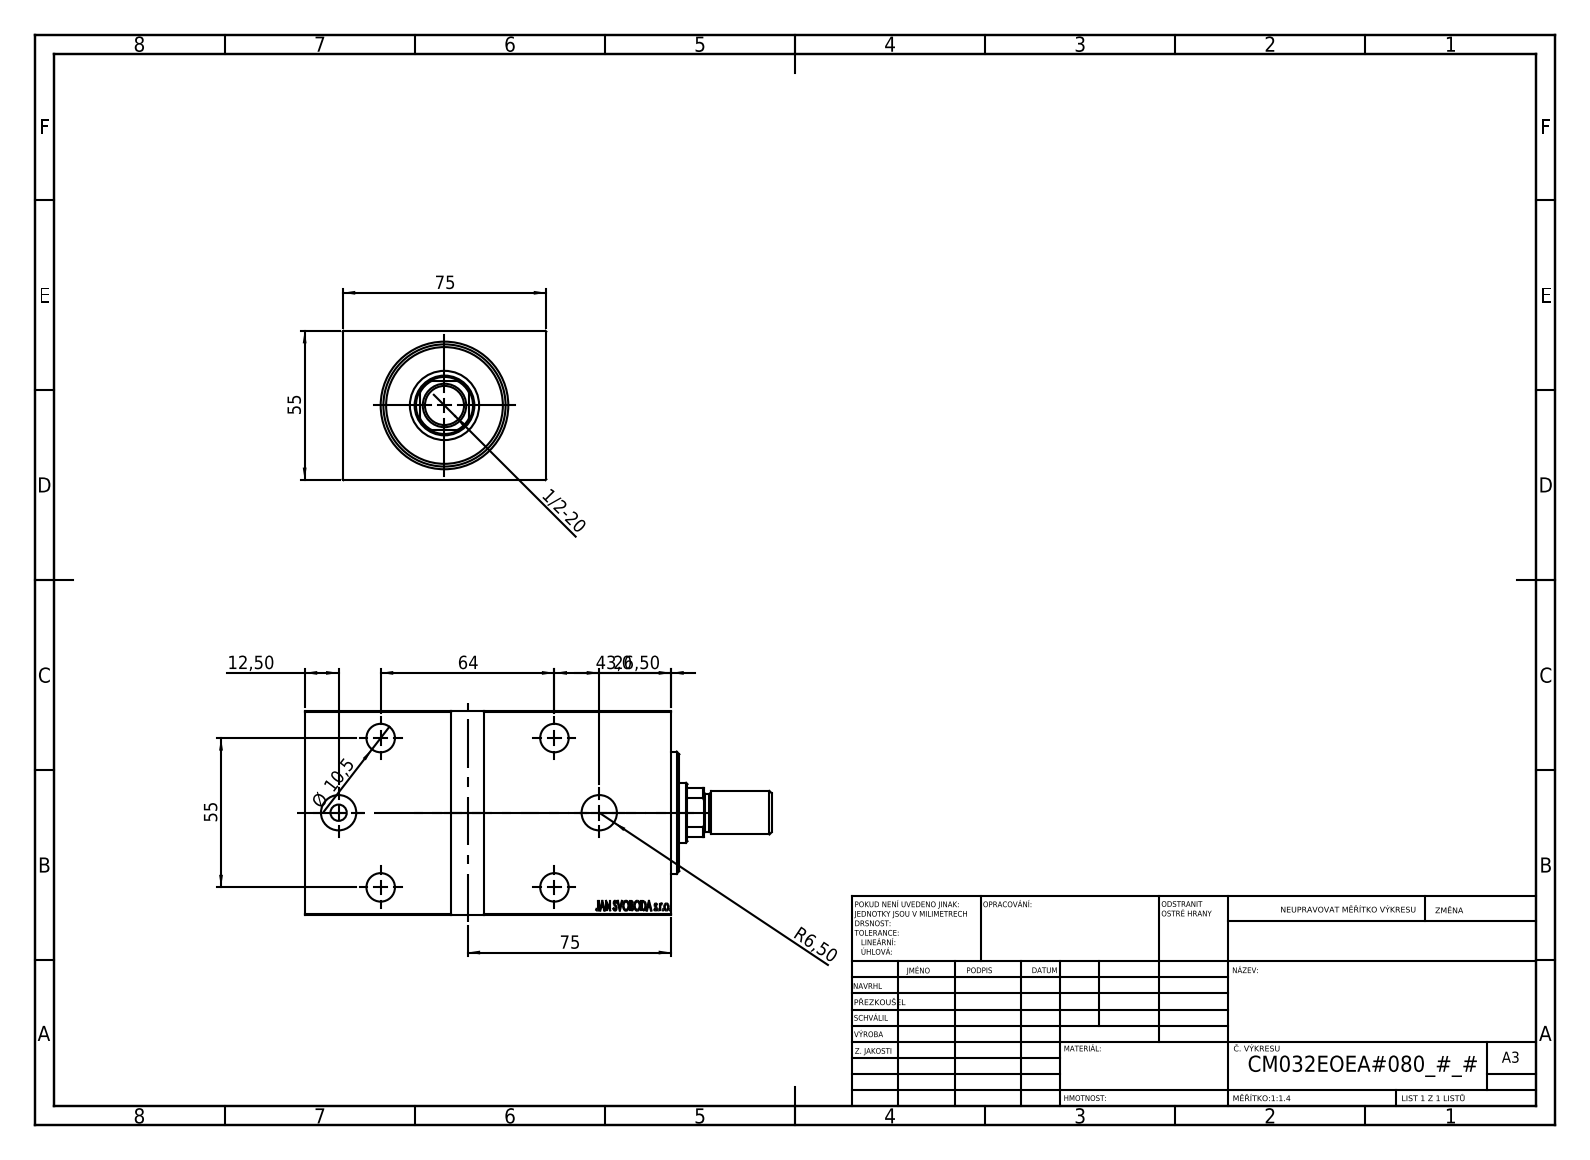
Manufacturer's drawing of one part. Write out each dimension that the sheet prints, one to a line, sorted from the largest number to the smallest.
75
75
64
55
55
43,0
26,50
12,50
Ø 10,5
R6,50
1/2-20
